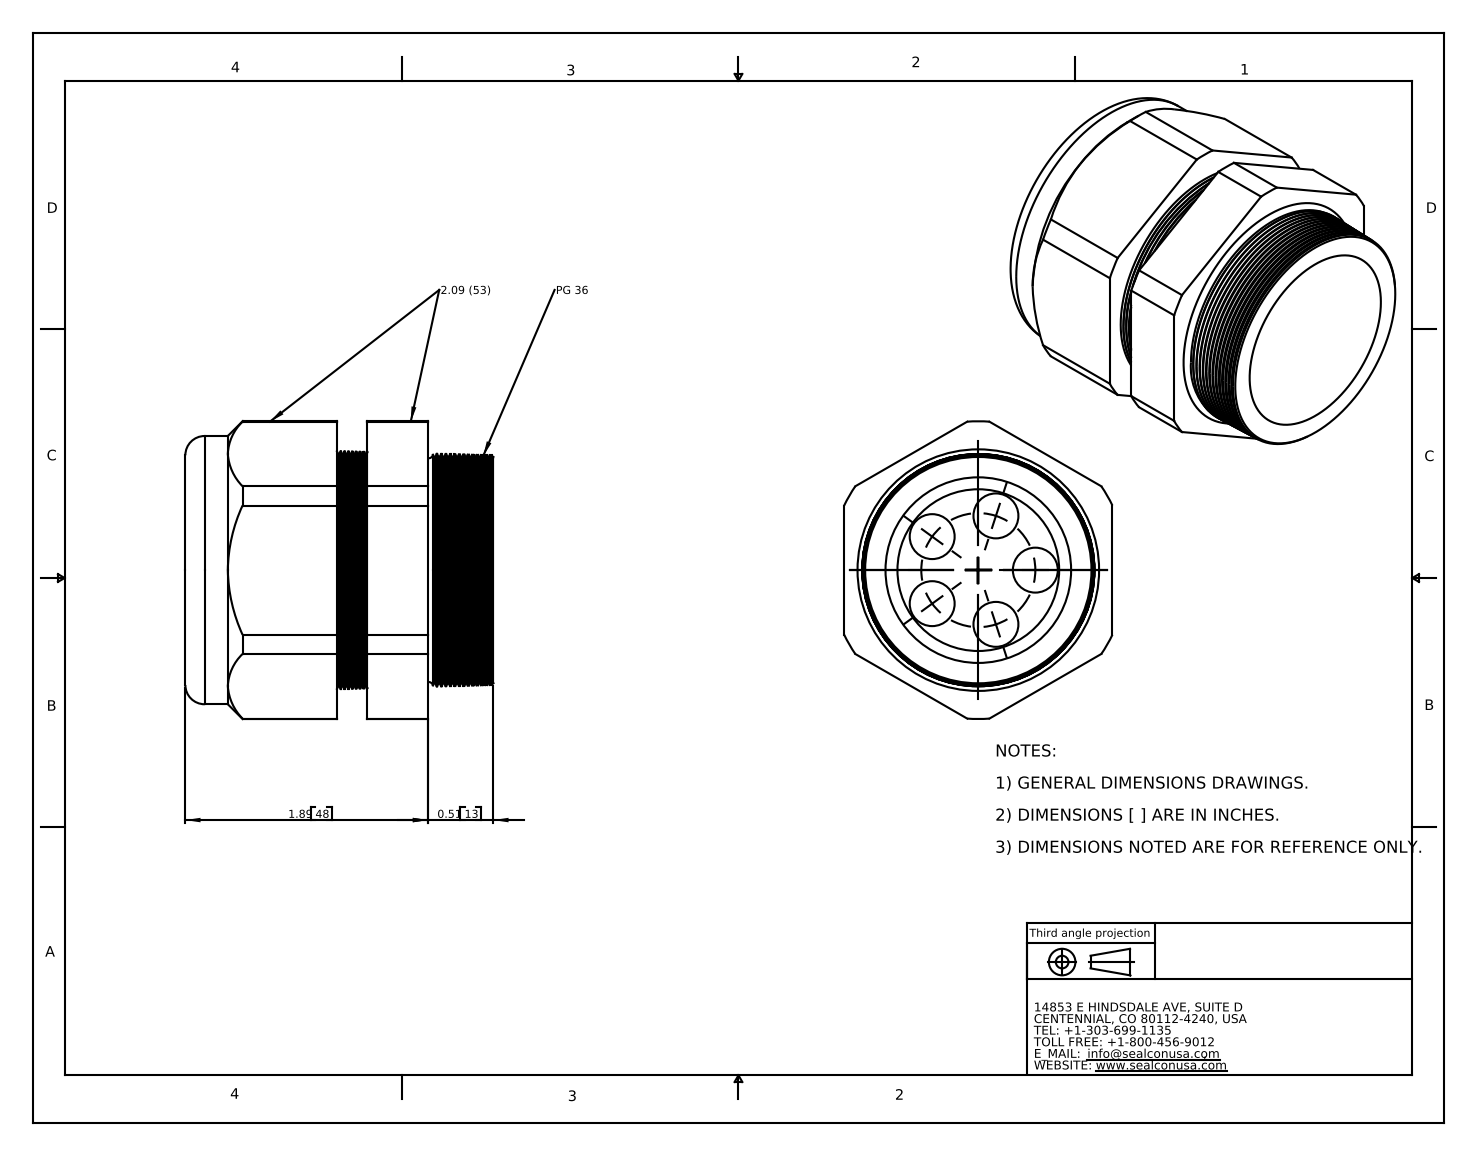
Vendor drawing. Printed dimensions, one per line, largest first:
1.89 48
0.51 13
